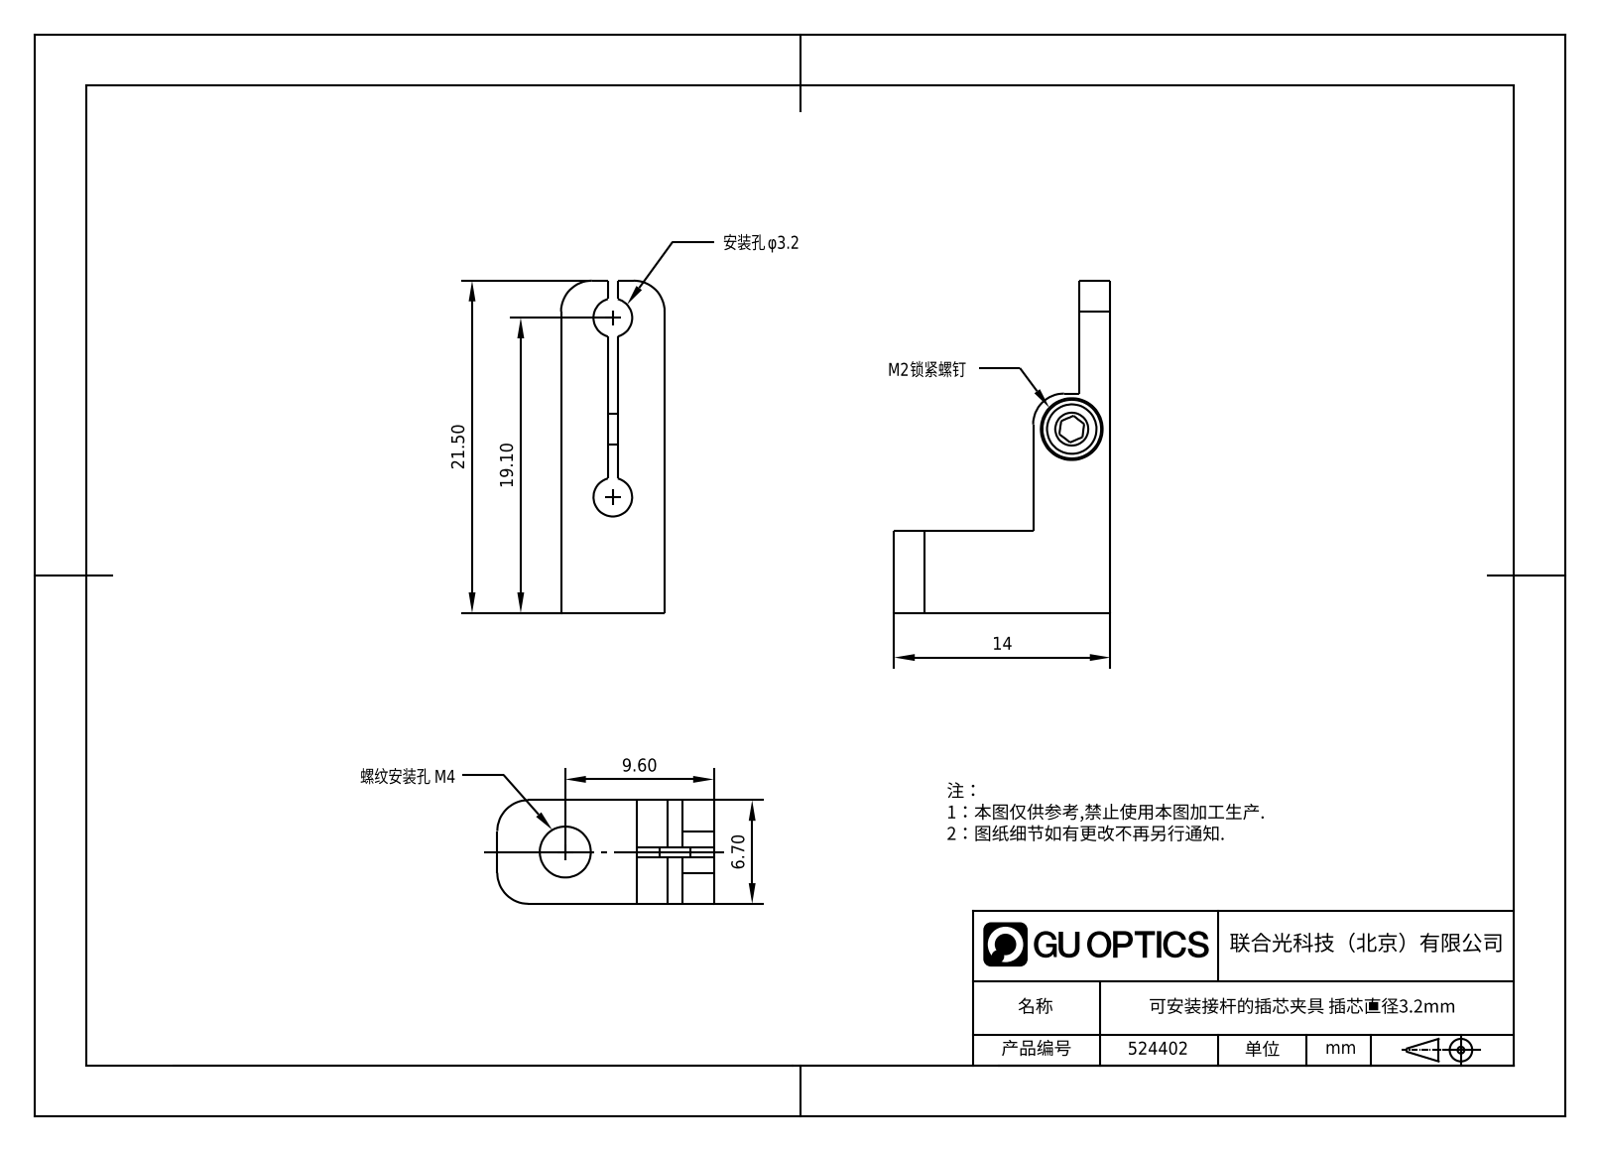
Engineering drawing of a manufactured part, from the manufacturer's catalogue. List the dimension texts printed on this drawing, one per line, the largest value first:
21.50
19.10
14
9.60
6.70
